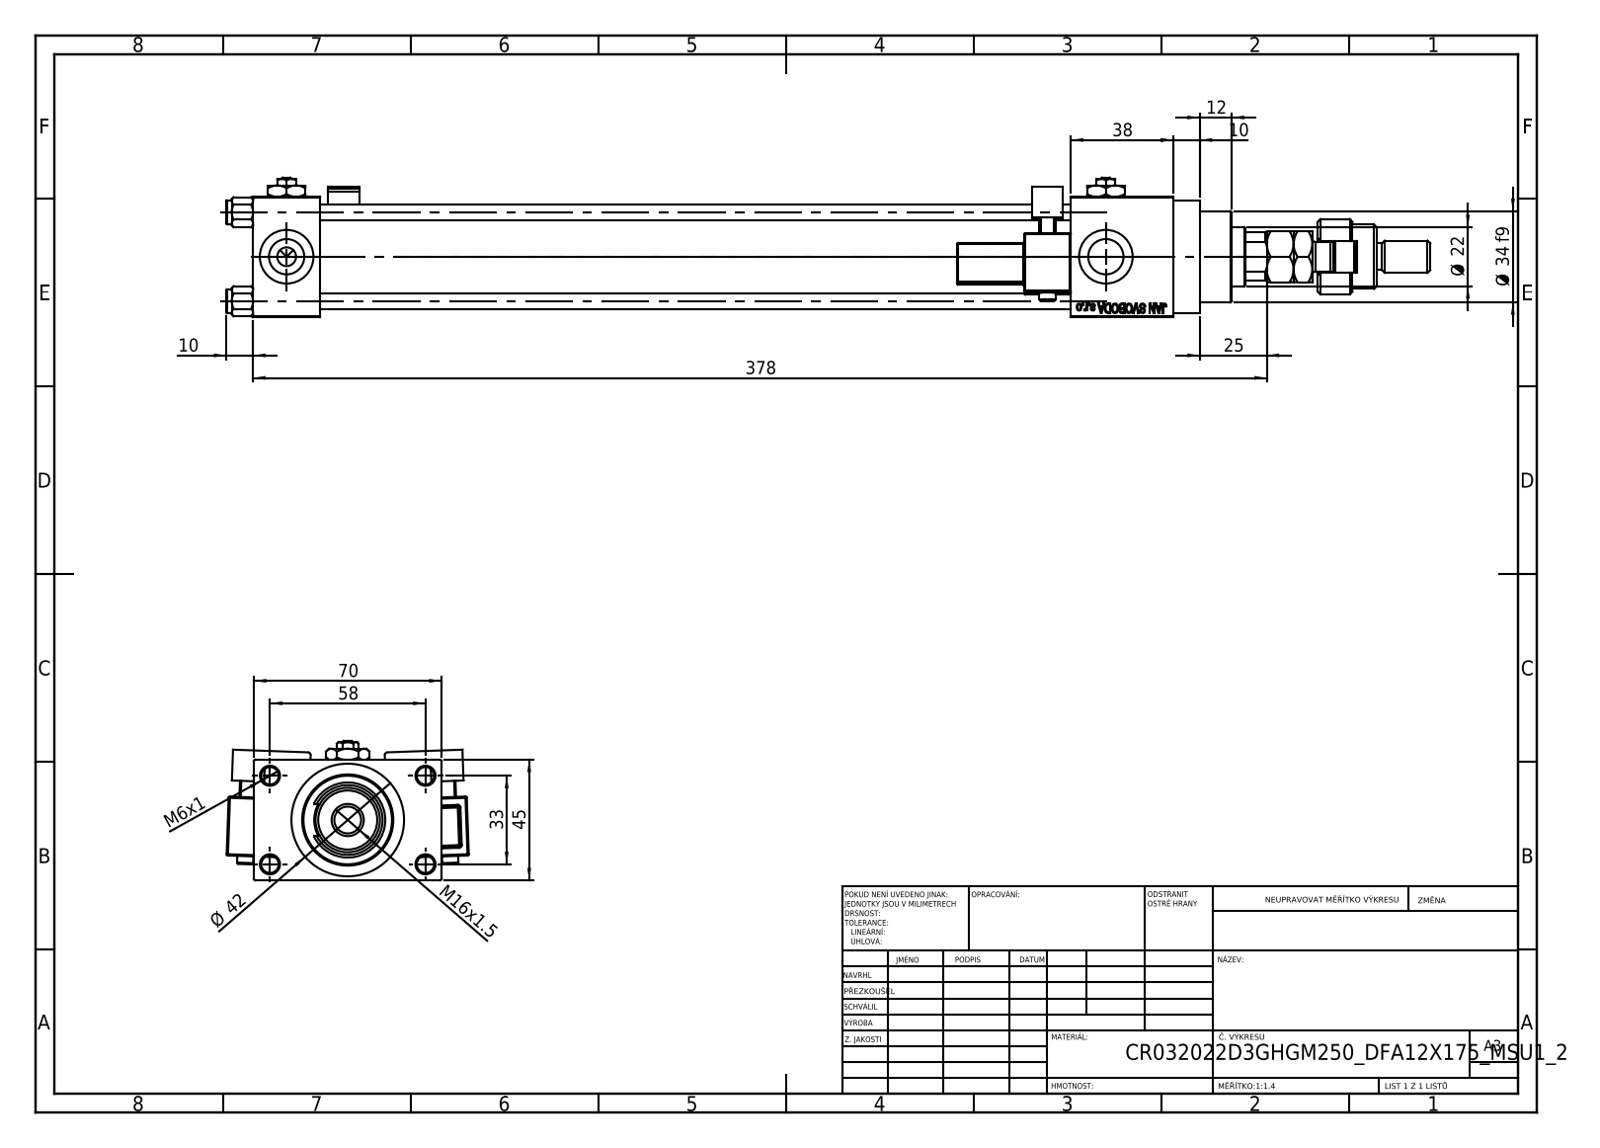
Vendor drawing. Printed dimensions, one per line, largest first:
378
70
58
45
Ø 42
38
Ø 34 f9
33
25
Ø 22
M16x1.5
12
10
10
M6x1
